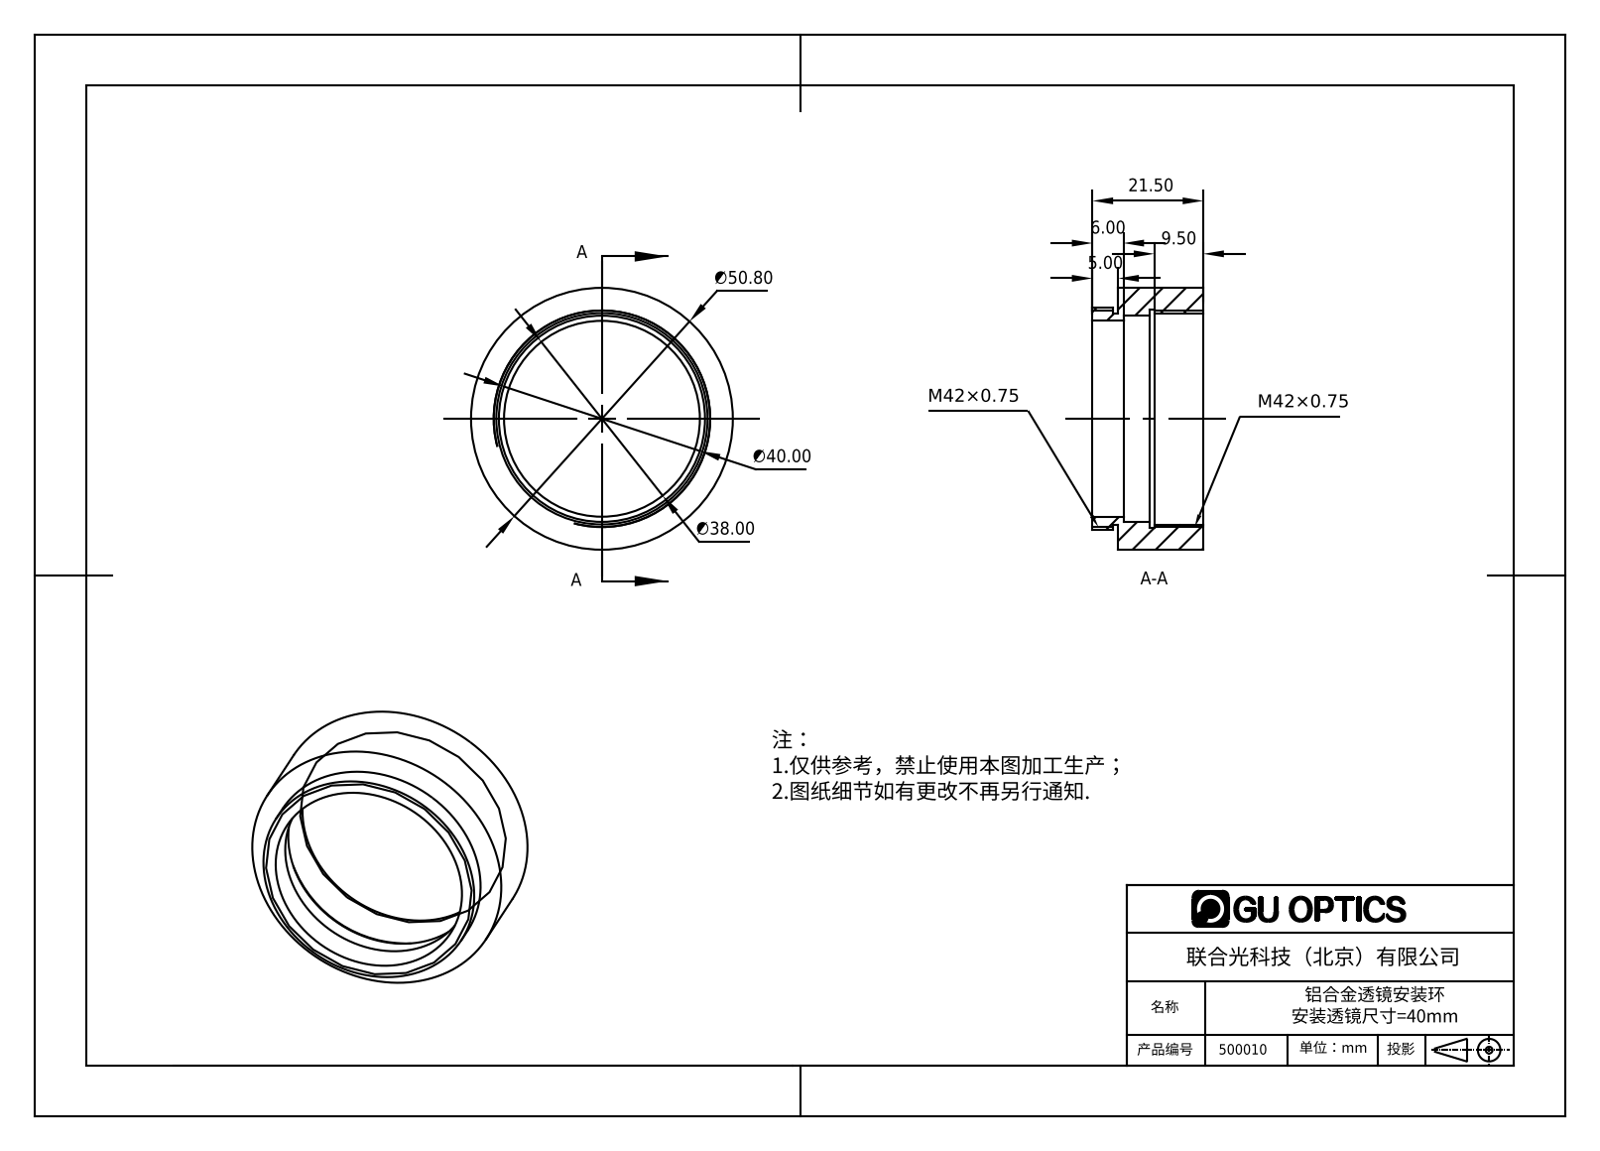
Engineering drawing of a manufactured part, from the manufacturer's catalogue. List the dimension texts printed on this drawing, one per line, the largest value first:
∅50.80
∅40.00
∅38.00
21.50
9.50
6.00
5.00
